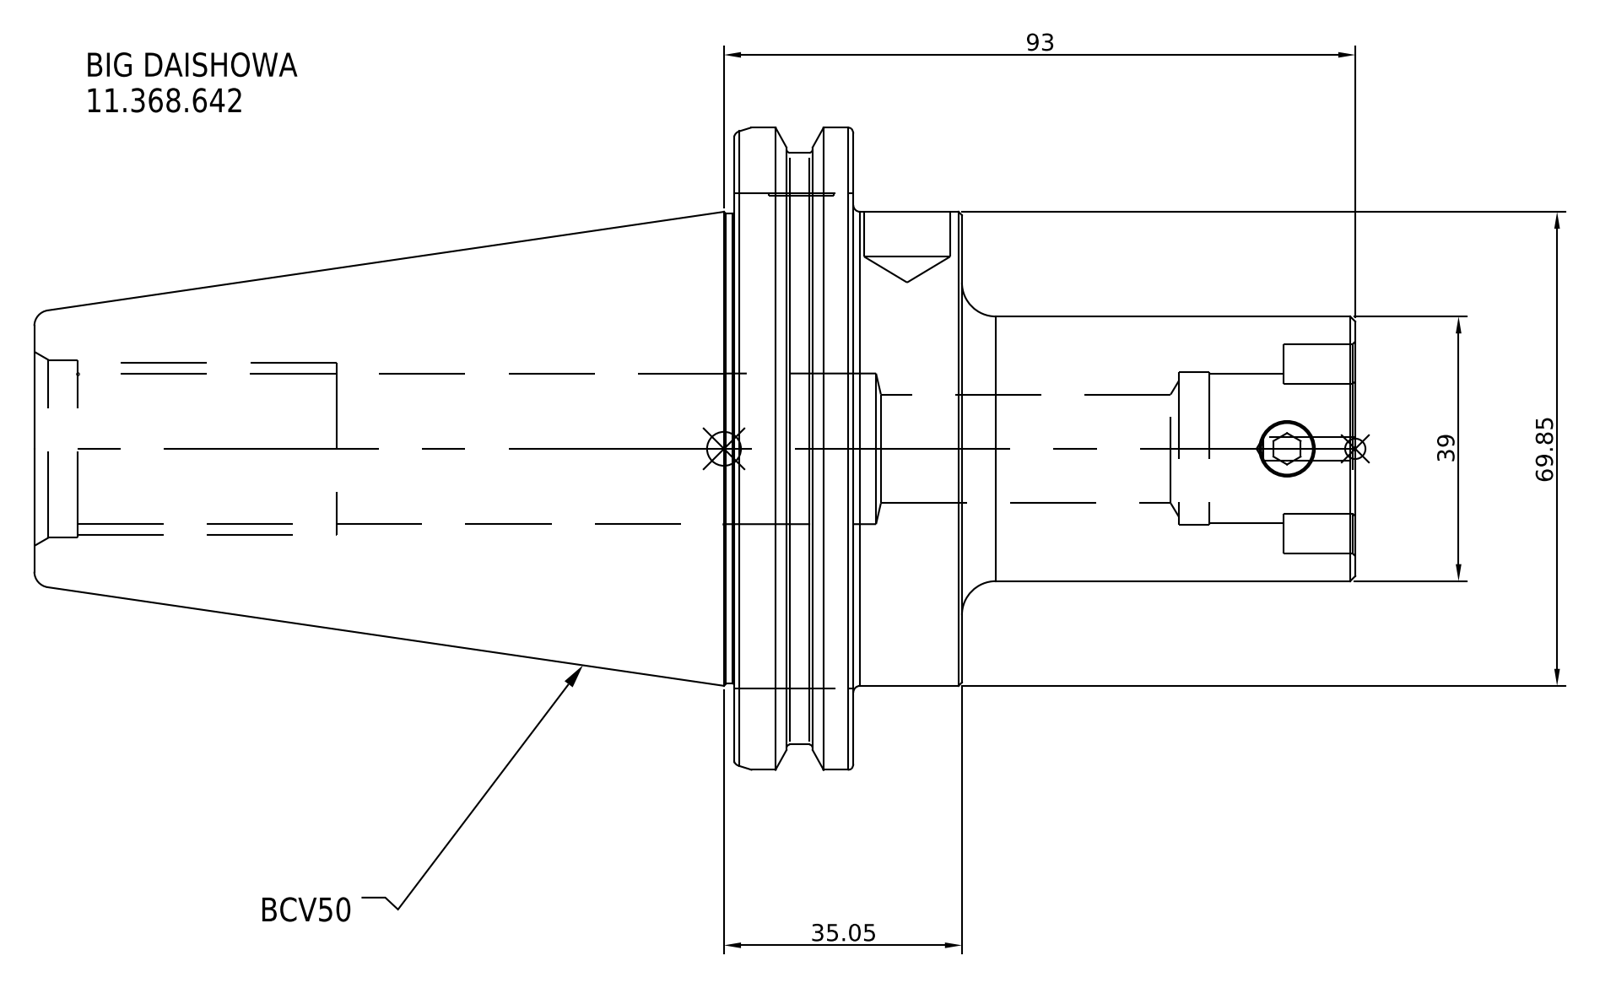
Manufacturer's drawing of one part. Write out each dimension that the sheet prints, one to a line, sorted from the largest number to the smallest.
93
69.85
39
35.05
